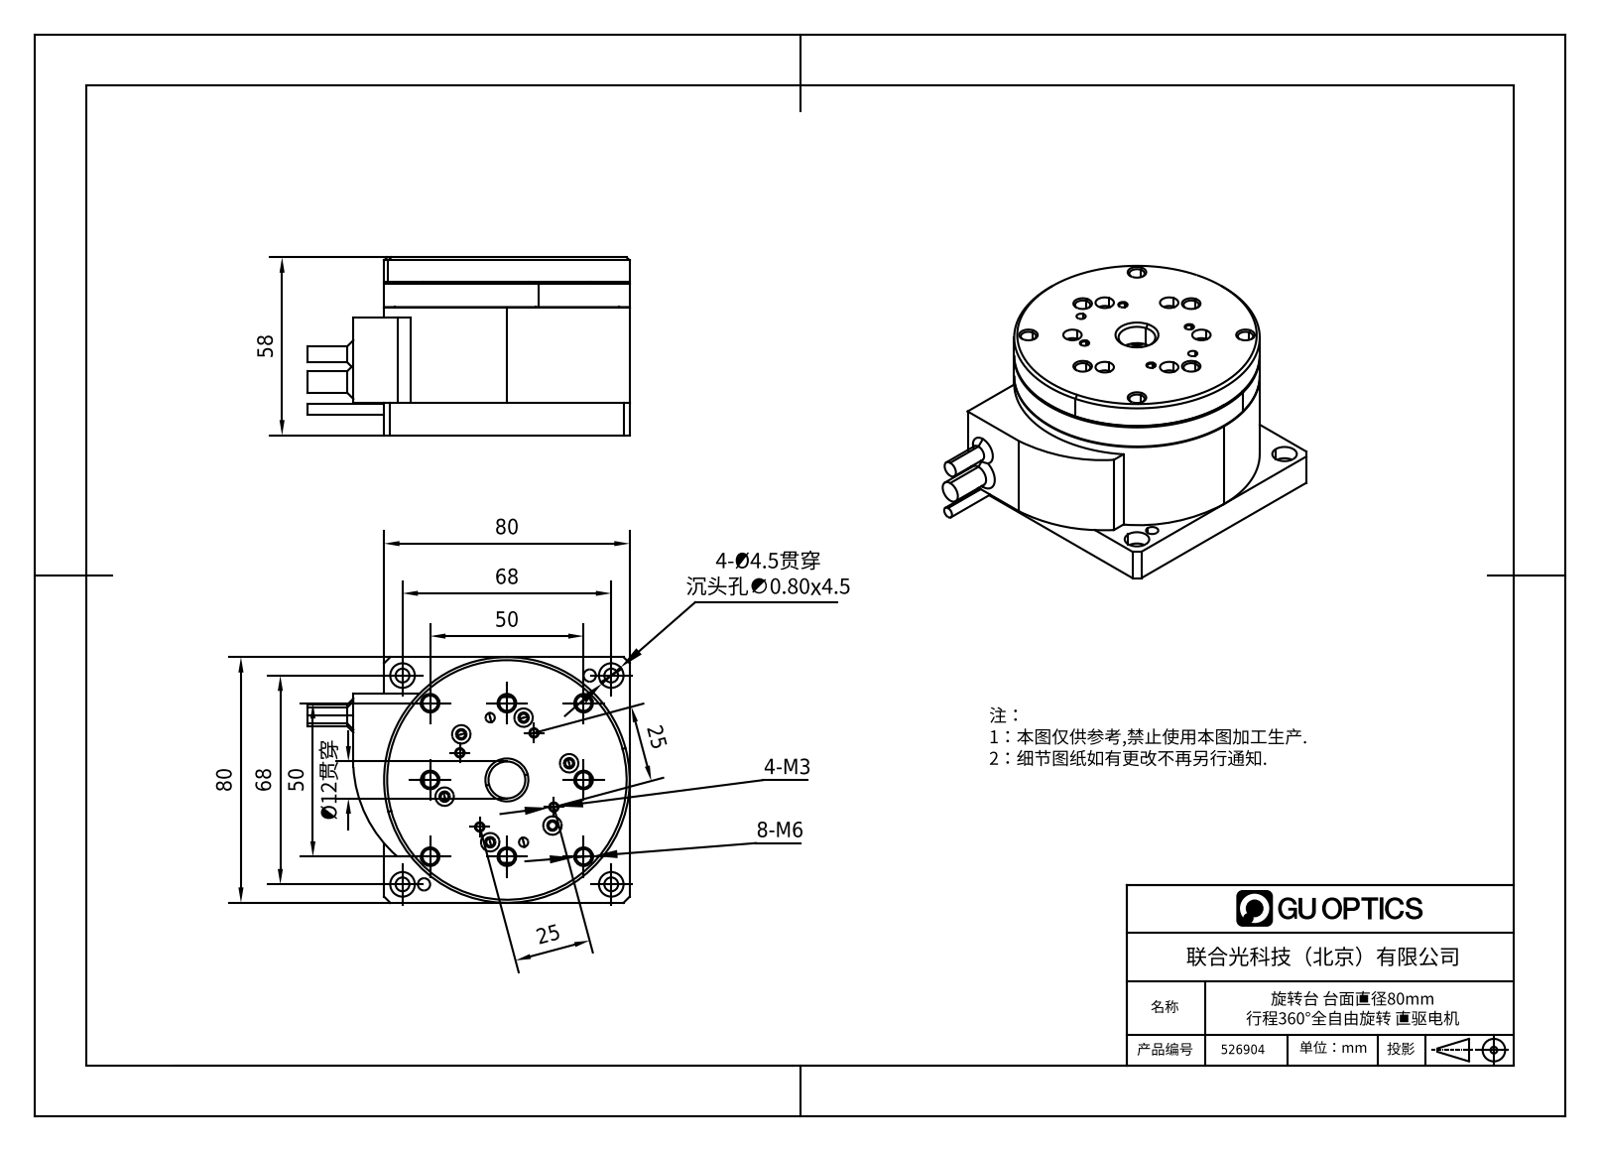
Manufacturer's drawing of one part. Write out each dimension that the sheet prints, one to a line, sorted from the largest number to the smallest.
80
80
68
68
58
50
50
25
25
Ø12贯穿
8-M6
4-Ø4.5贯穿 沉头孔x4.5
4-M3
